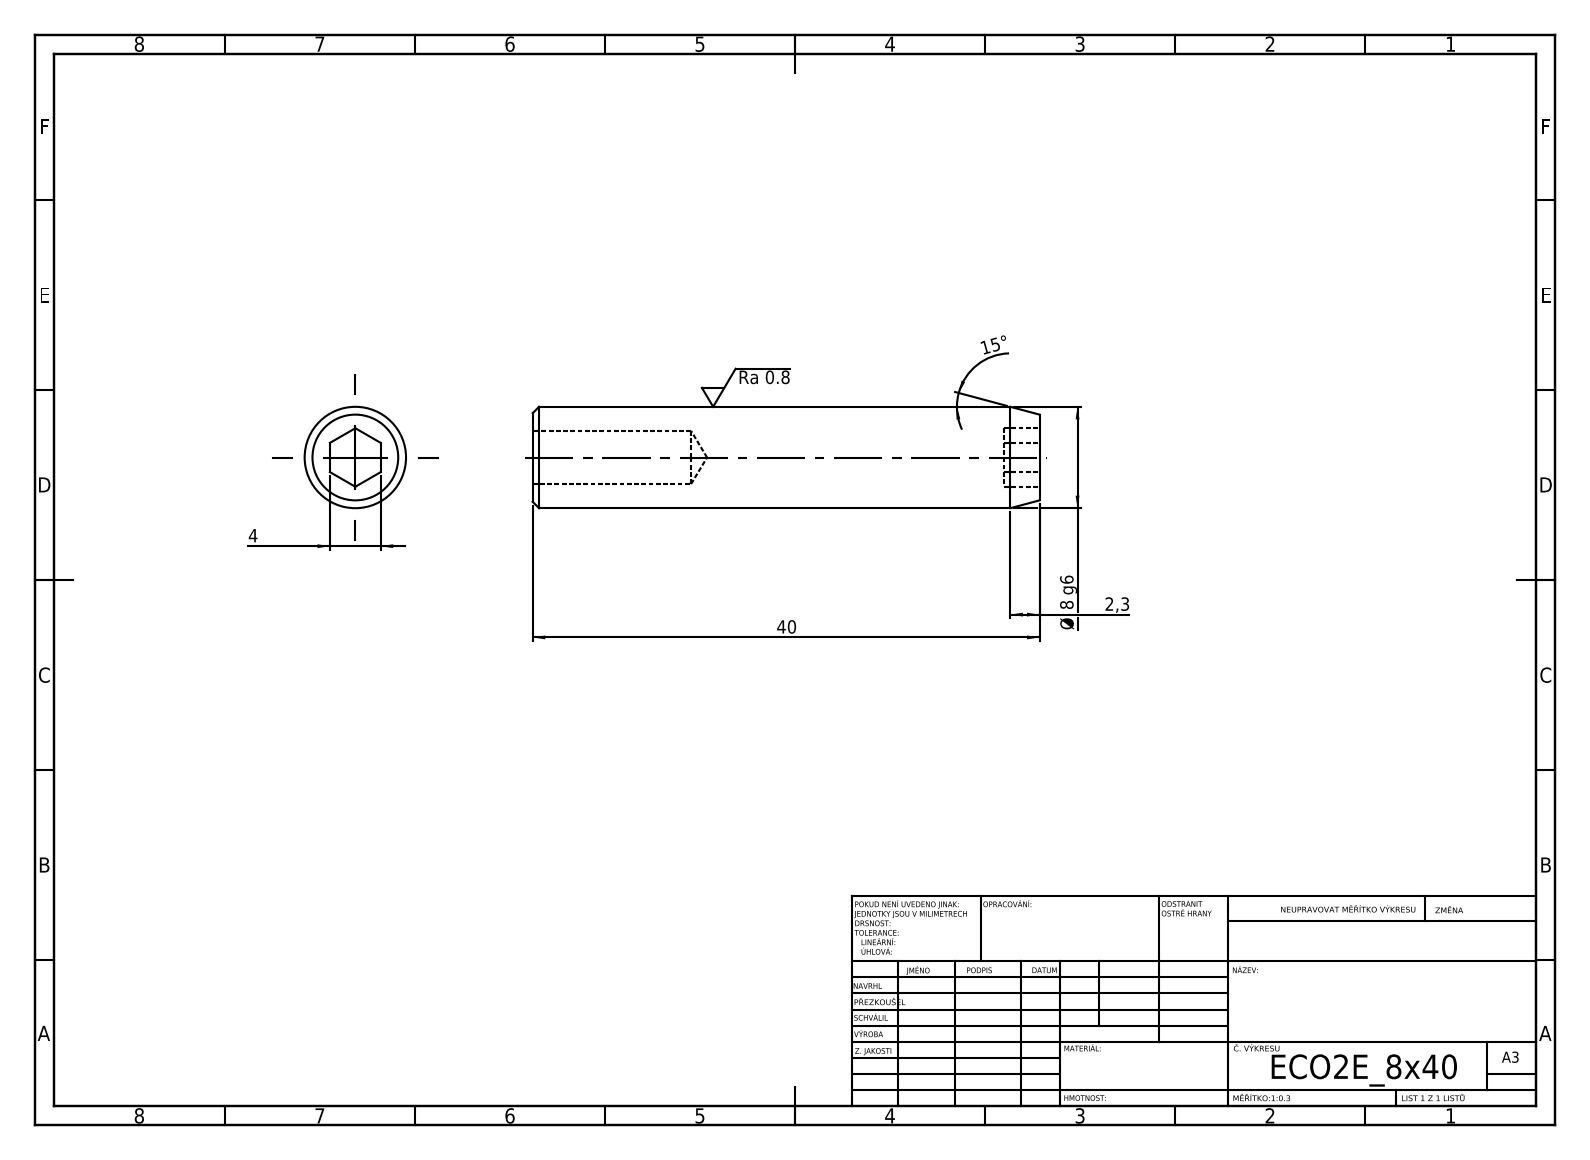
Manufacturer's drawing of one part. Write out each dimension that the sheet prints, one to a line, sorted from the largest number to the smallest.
40
15°
Ø 8 g6
4
2,3
